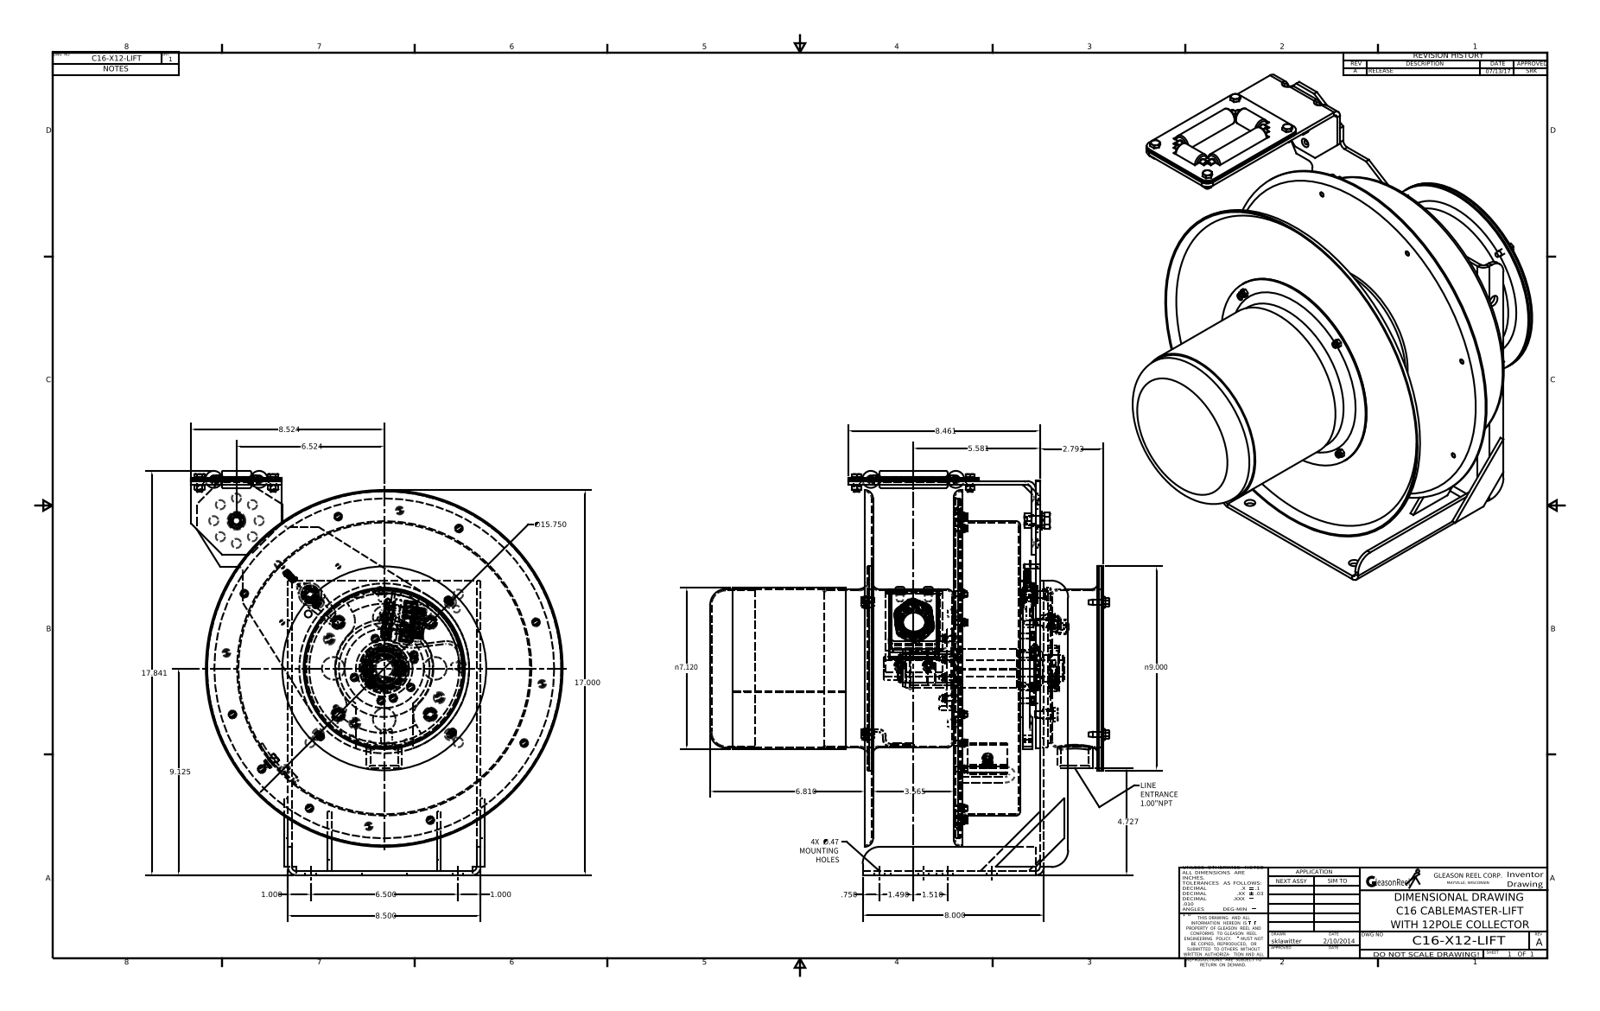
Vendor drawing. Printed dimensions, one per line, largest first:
17.841
17.000
∅15.750
9.125
n9.000
8.524
8.500
8.461
8.000
n7.120
6.810
6.524
6.500
5.581
4.727
3.565
2.793
1.510
1.490
1.000
1.000
.750
